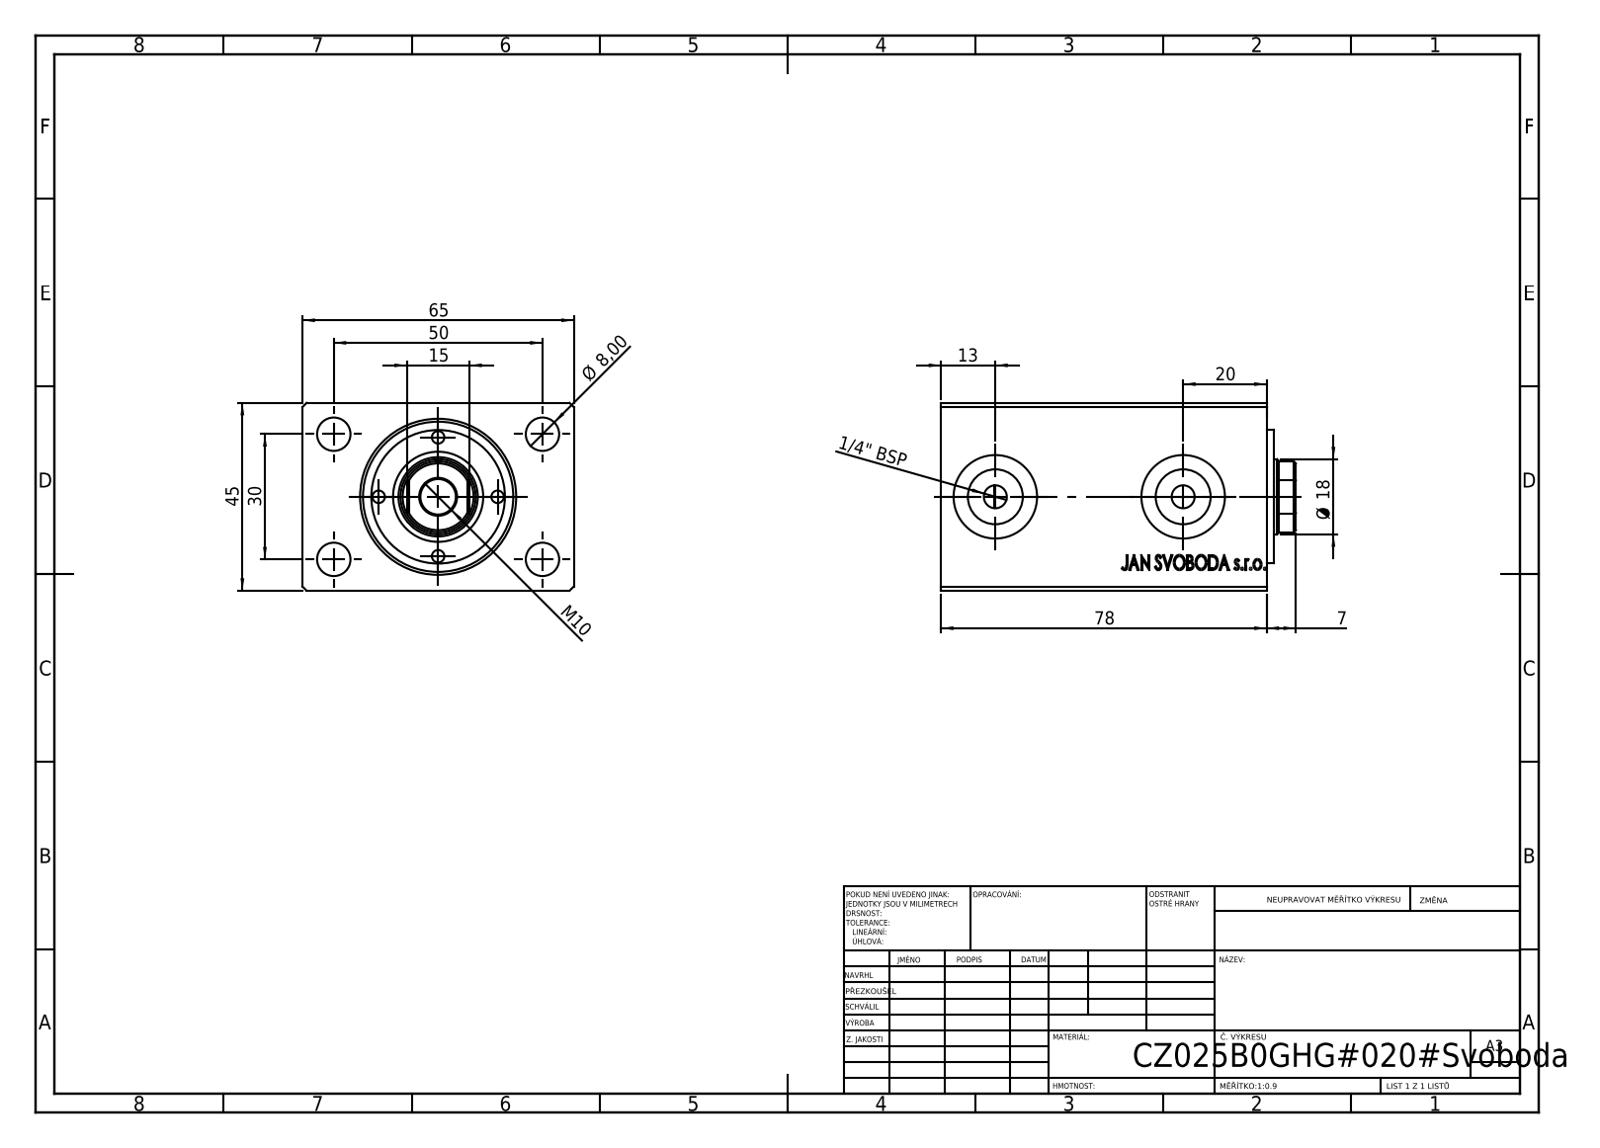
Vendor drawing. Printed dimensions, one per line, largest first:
78
65
50
45
30
20
Ø 18
15
13
M10
Ø 8,00
7
1/4" BSP
